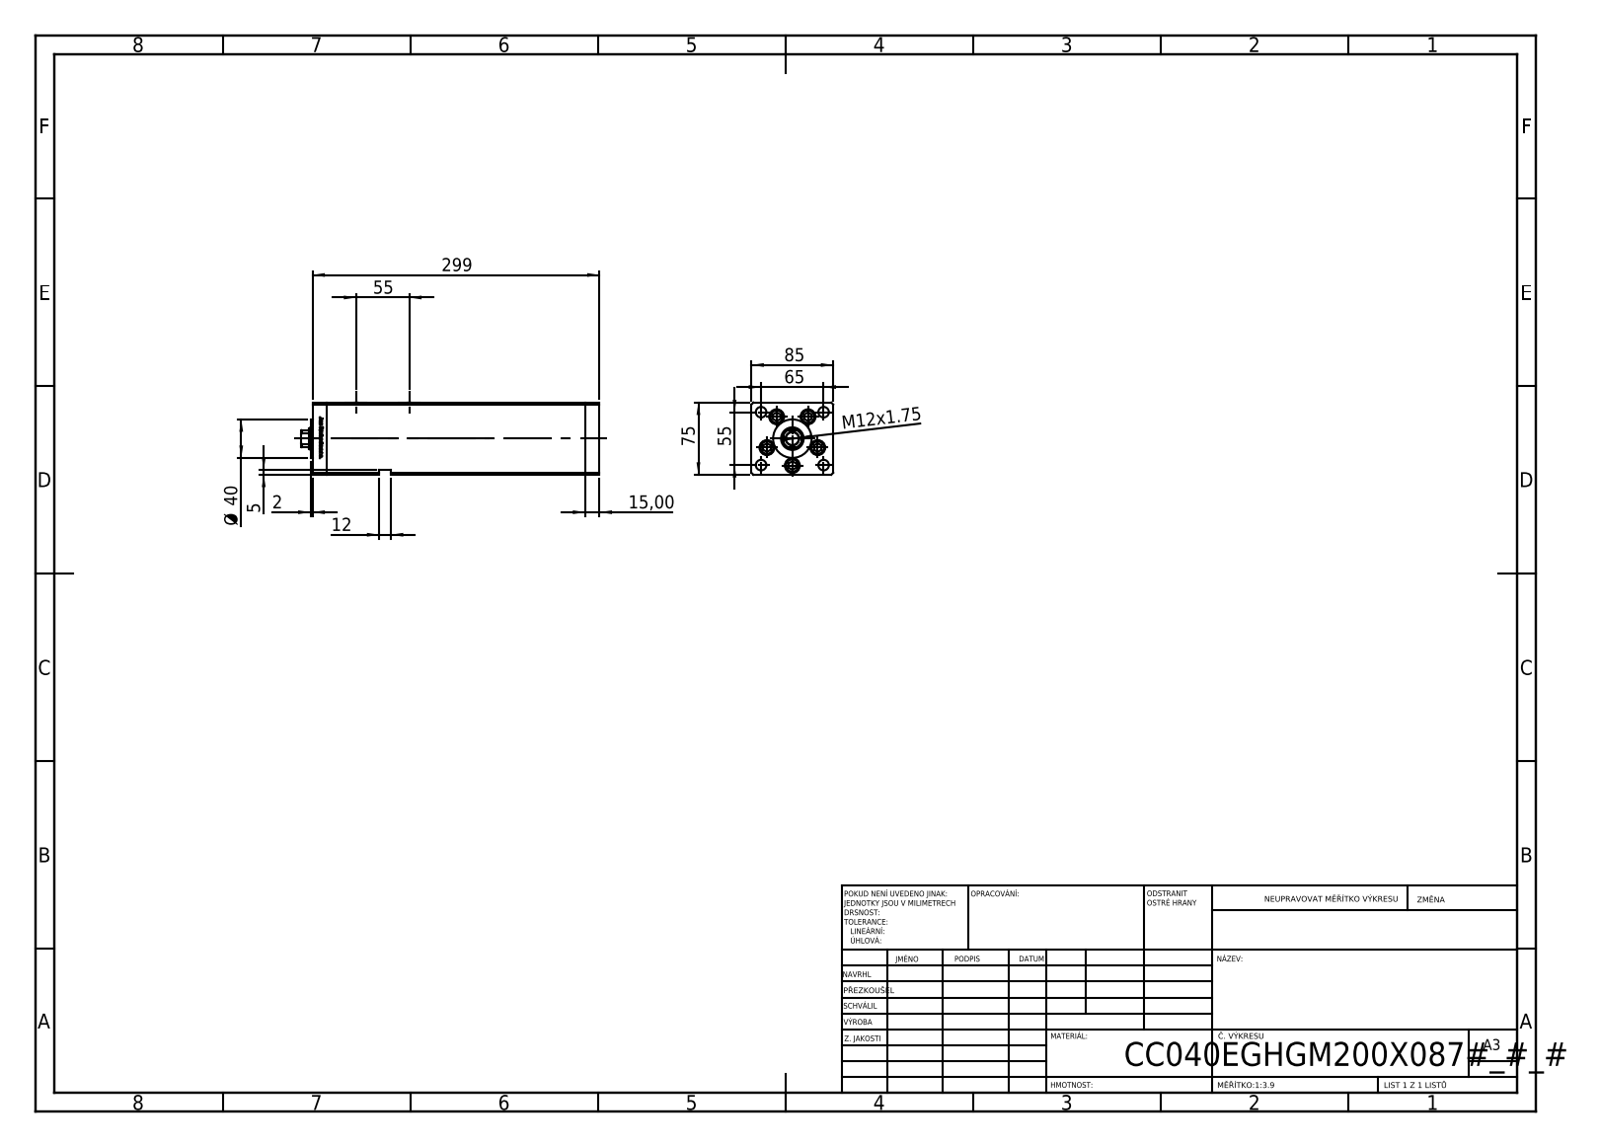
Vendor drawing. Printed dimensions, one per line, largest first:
299
85
75
65
55
55
Ø 40
15,00
12
M12x1.75
5
2
